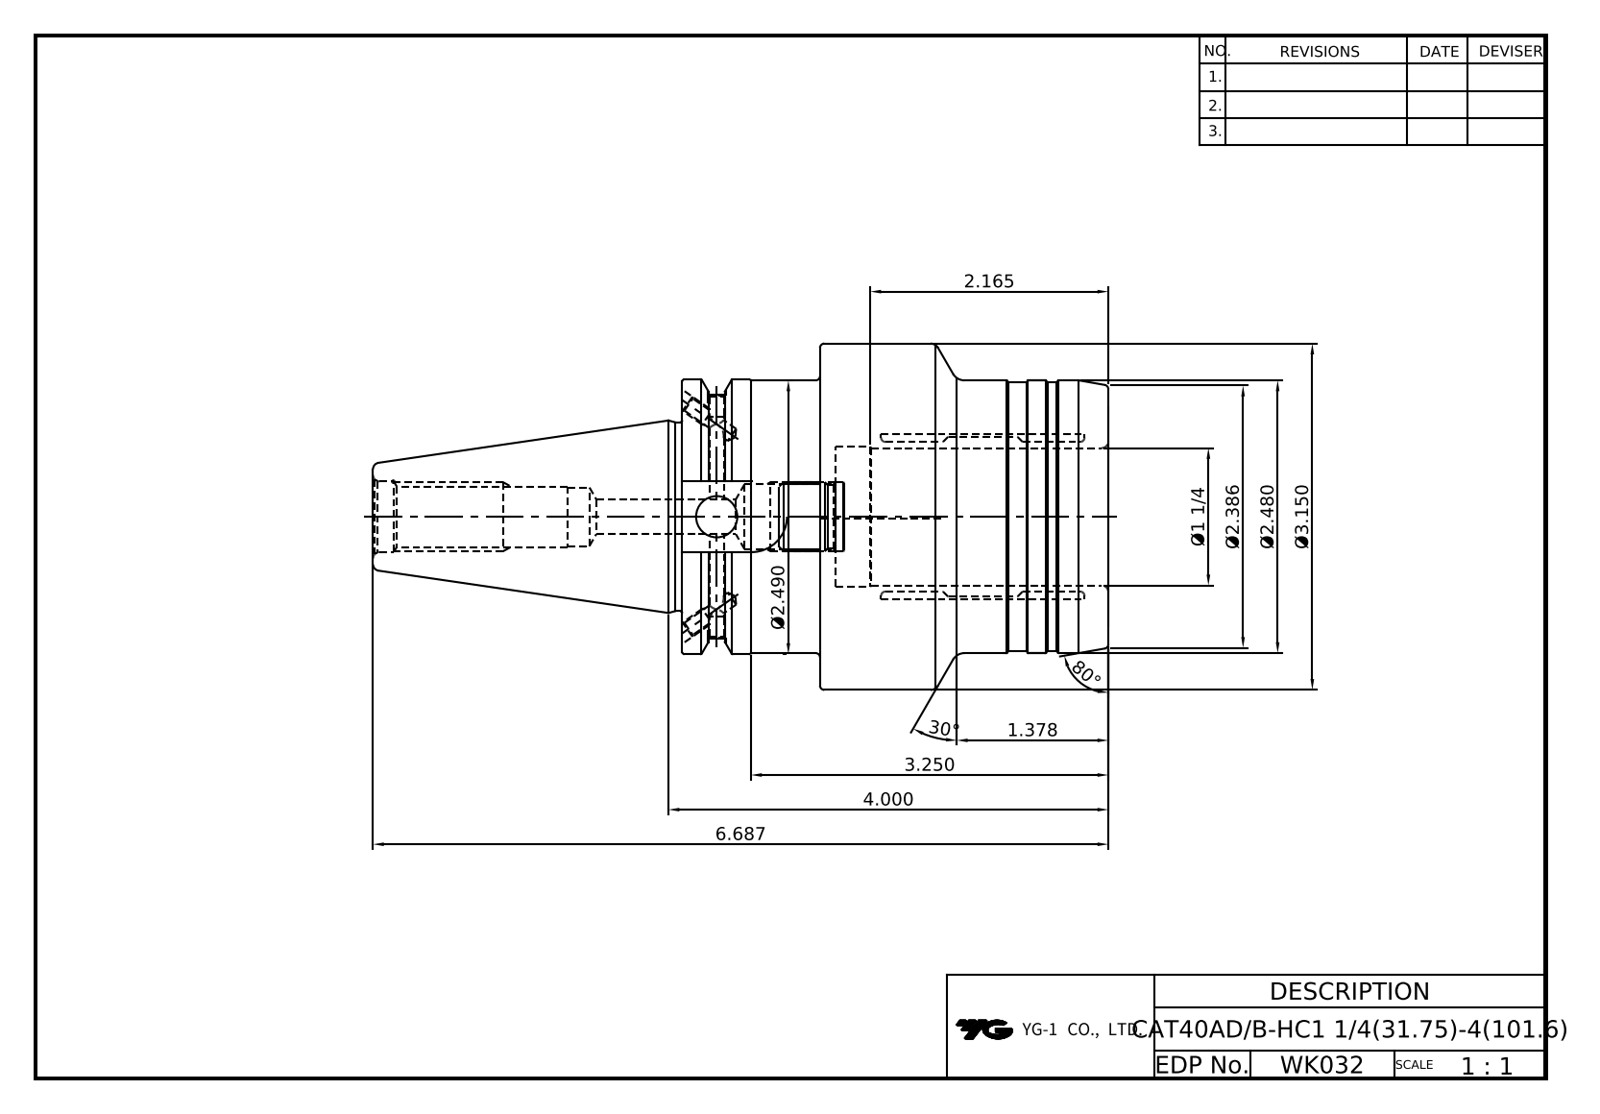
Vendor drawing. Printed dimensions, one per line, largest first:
80°
30°
6.687
4.000
3.250
Ø3.150
Ø2.490
Ø2.480
Ø2.386
2.165
1.378
Ø1 1/4
